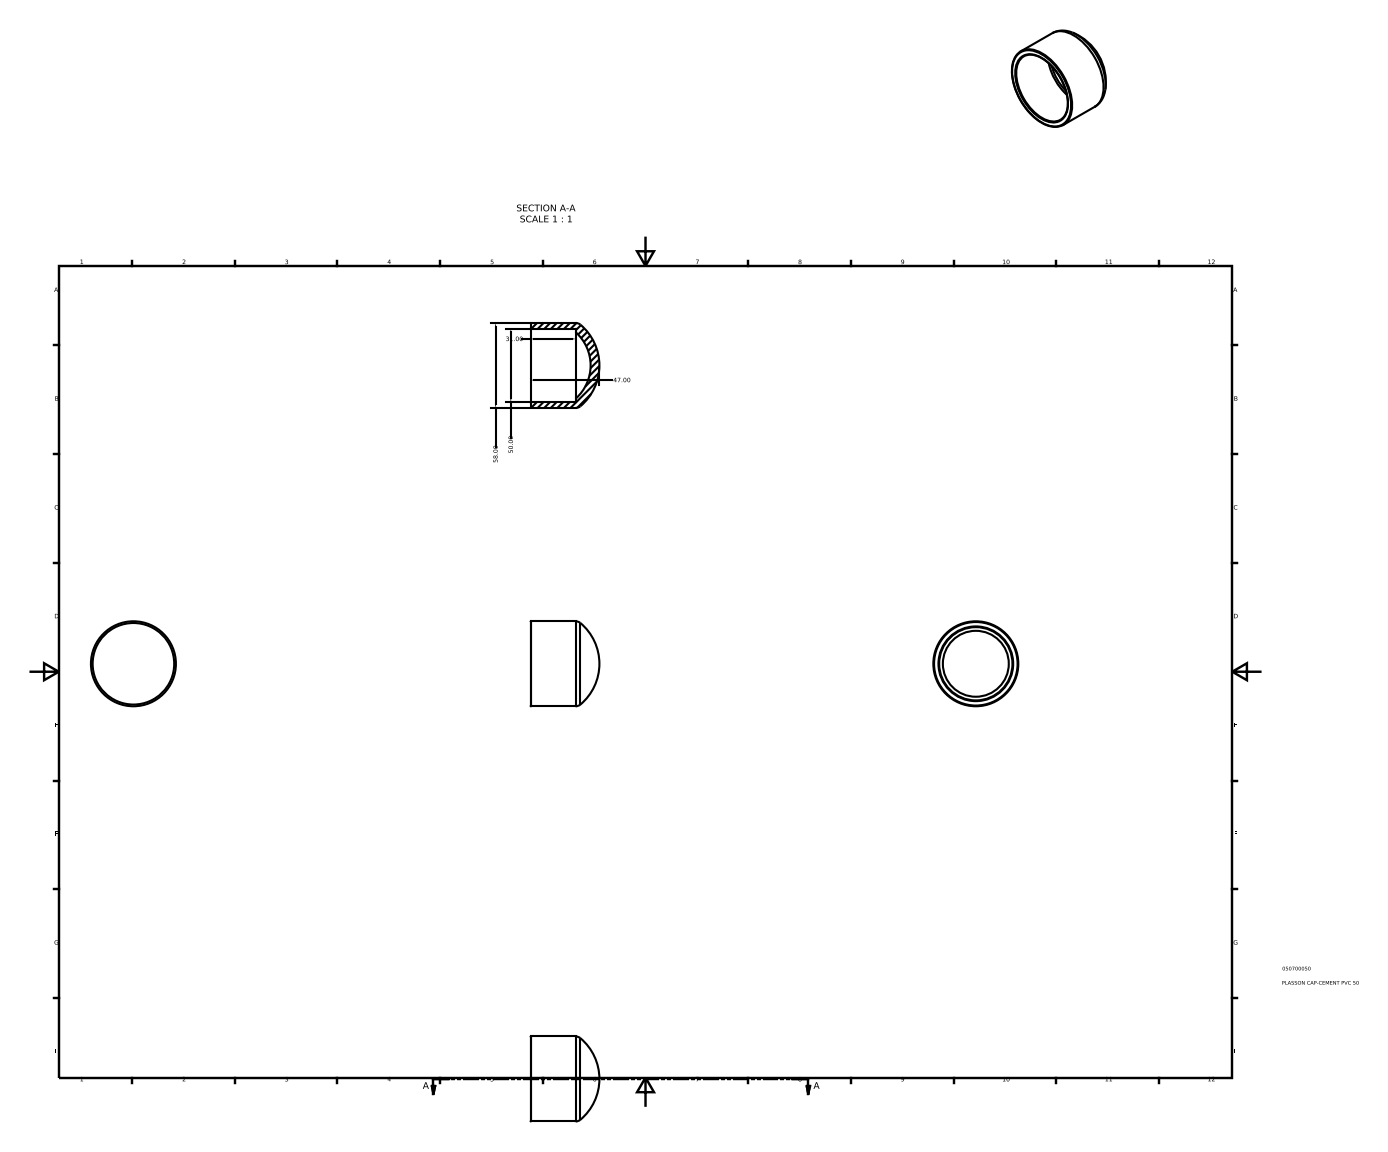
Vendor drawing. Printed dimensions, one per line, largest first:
58.00
50.00
47.00
31.00
